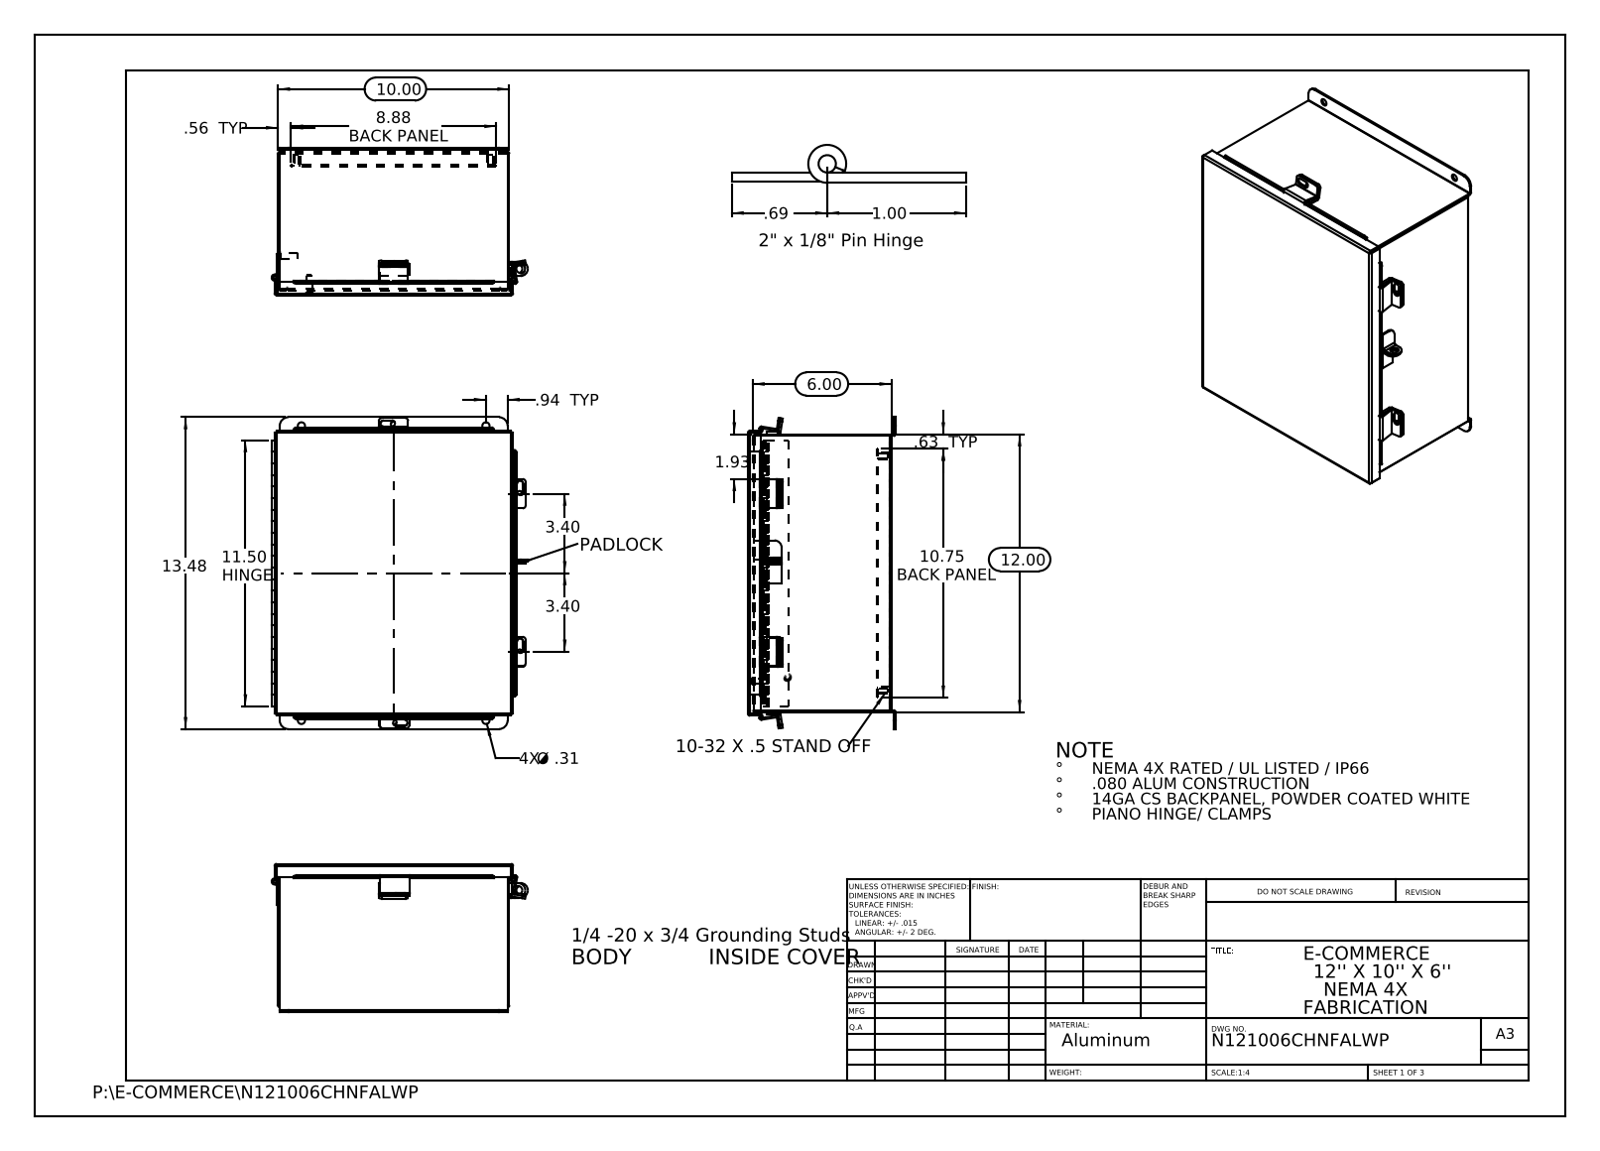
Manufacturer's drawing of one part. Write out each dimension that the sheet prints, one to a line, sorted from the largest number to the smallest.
13.48
12.00
11.50 HINGE
10.75 BACK PANEL
10.00
8.88 BACK PANEL
6.00
3.40
3.40
1.93
1.00
.94 TYP
.69
.63 TYP
.56 TYP
4X Ø .31
